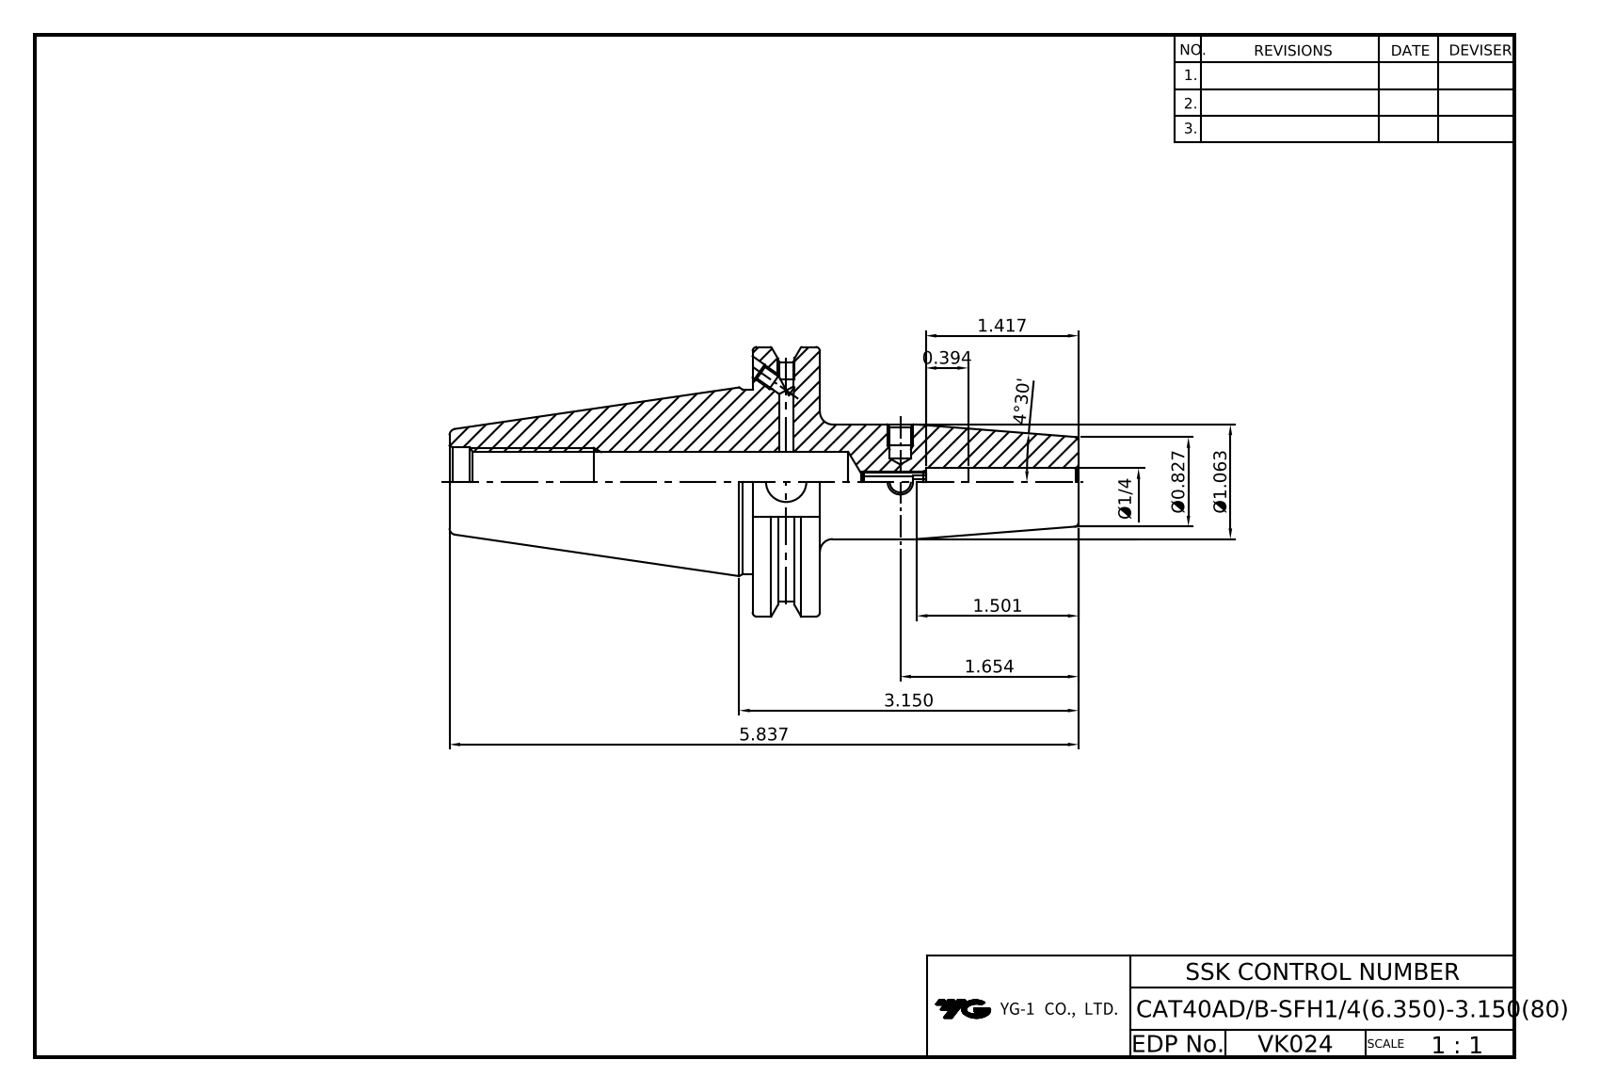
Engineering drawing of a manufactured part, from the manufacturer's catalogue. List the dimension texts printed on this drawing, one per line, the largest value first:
5.837
4°30'
3.150
1.654
1.501
1.417
Ø1.063
Ø0.827
0.394
